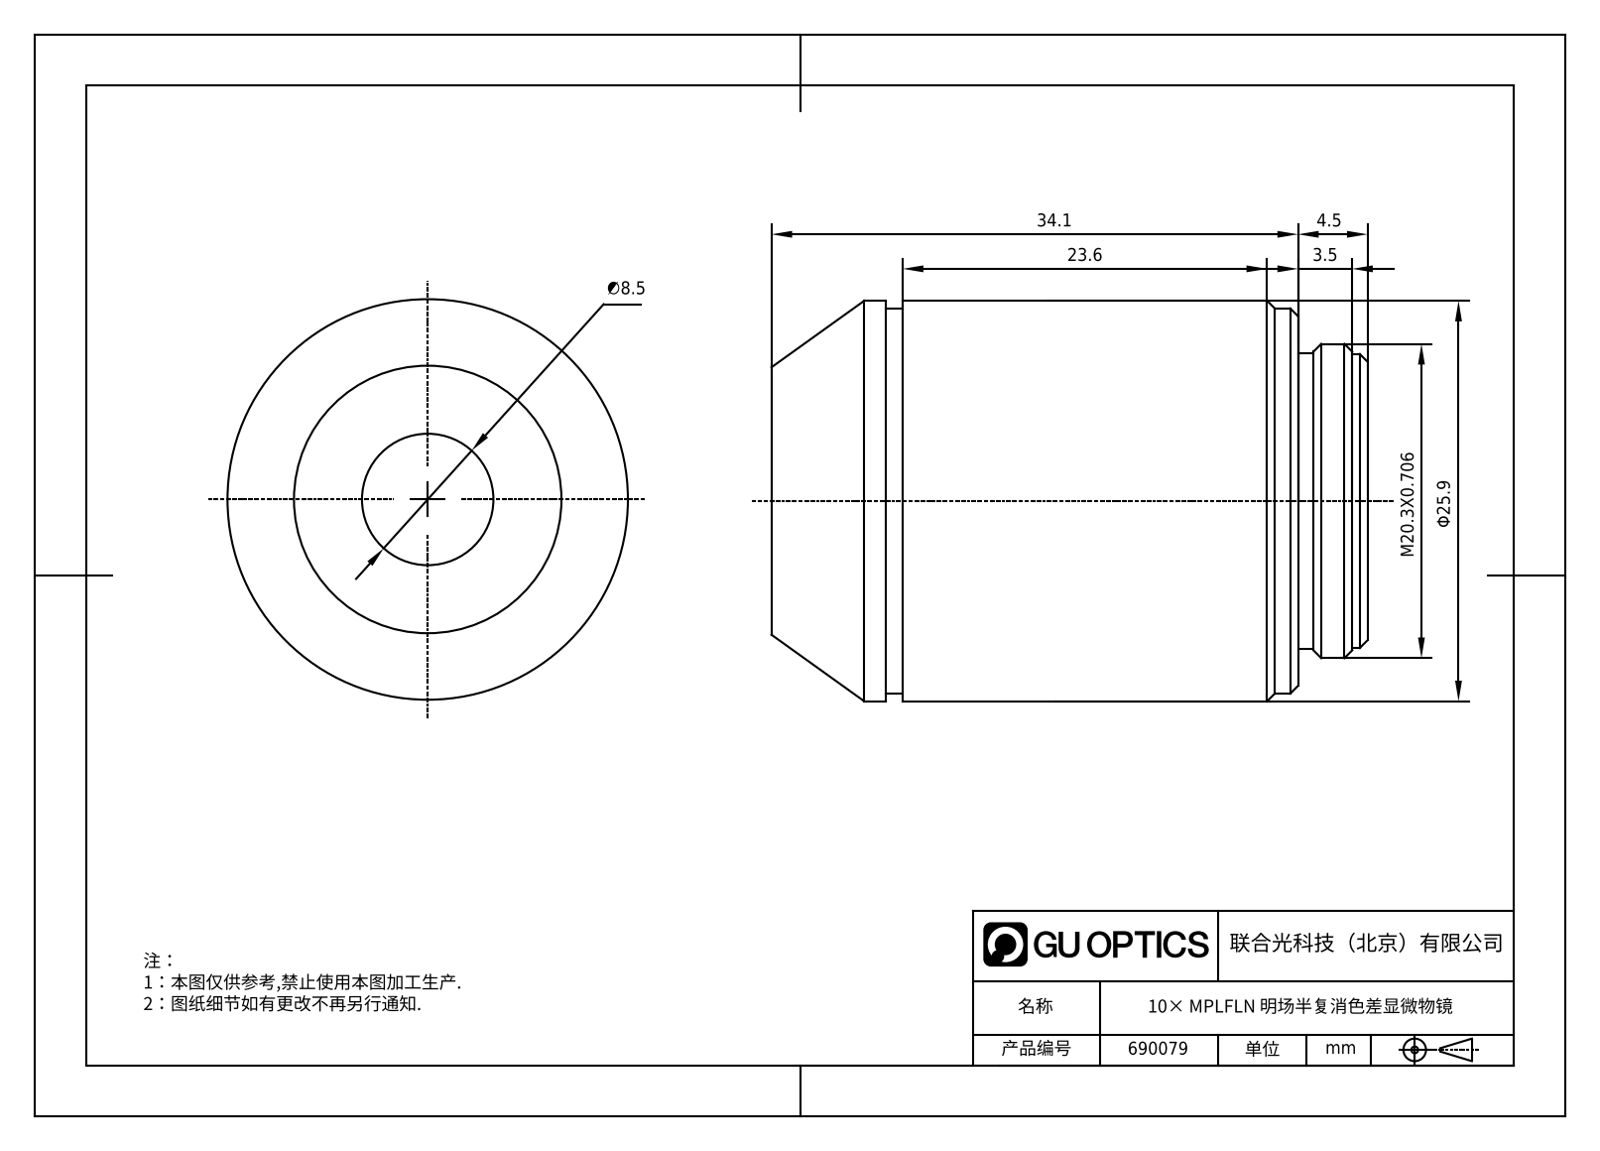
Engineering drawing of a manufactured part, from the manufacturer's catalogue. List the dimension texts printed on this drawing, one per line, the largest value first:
34.1
Φ25.9
23.6
M20.3X0.706
∅8.5
4.5
3.5
